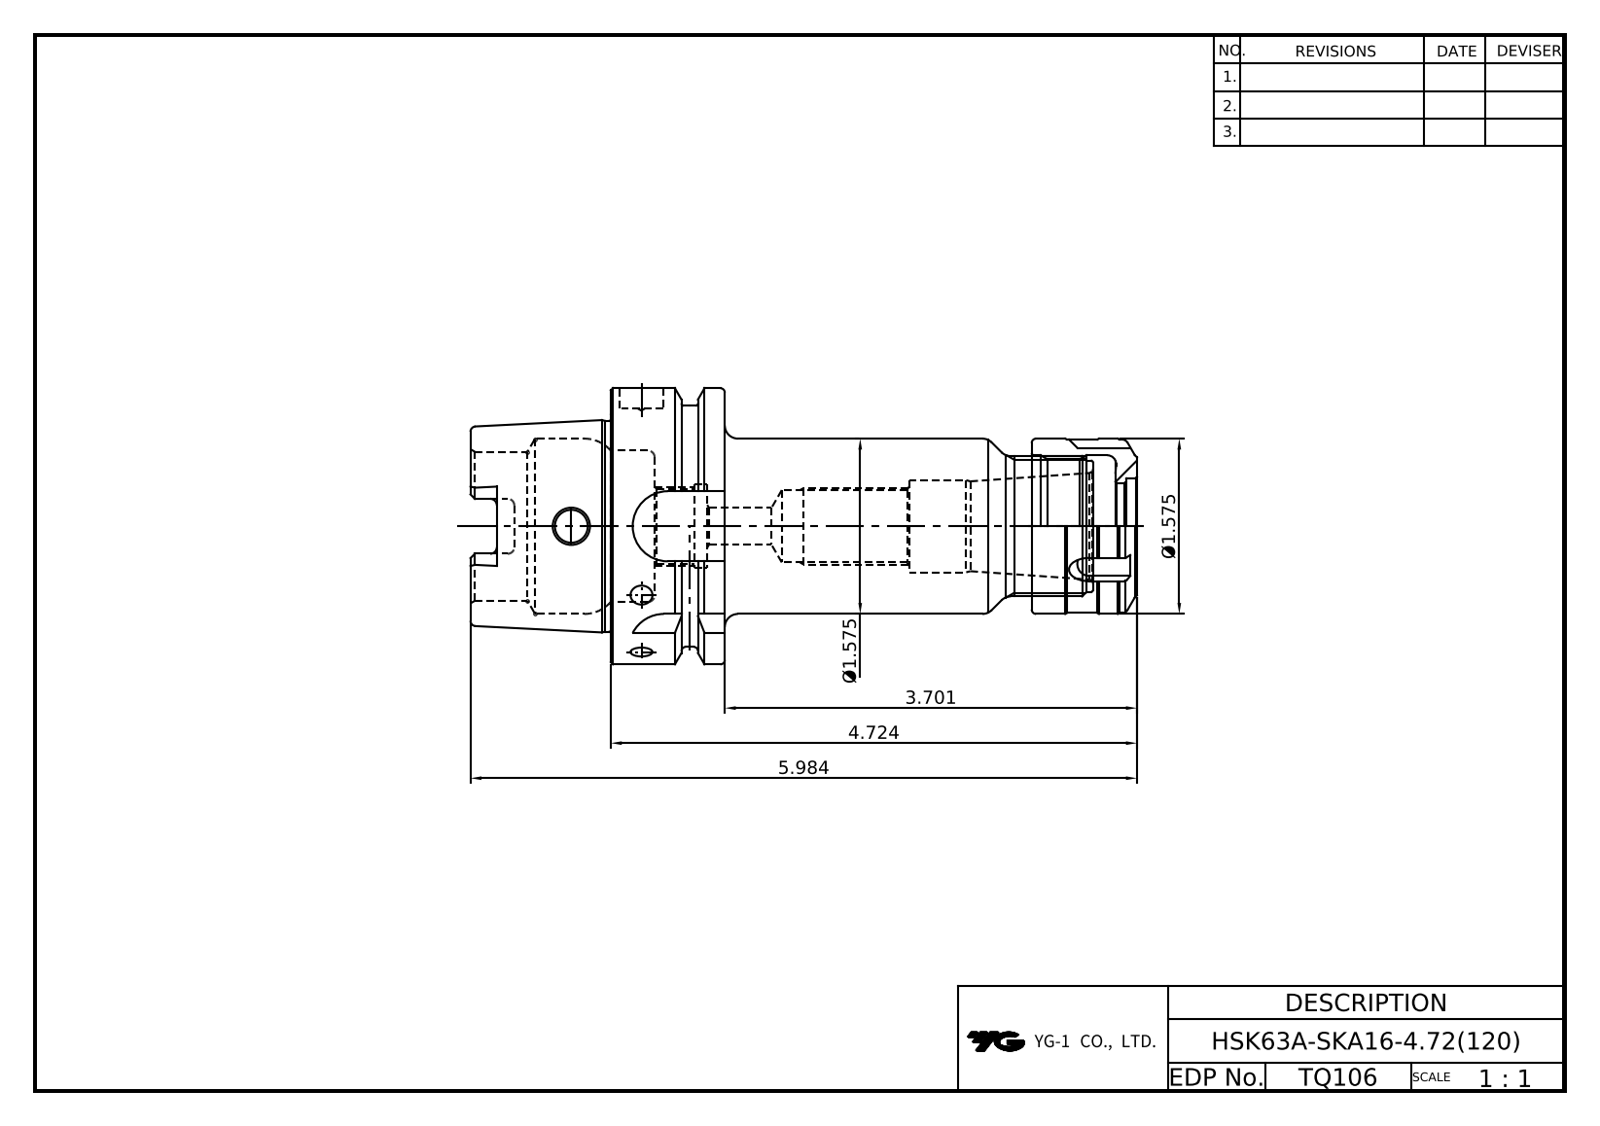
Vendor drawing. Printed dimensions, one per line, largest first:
5.984
4.724
3.701
Ø1.575
Ø1.575
